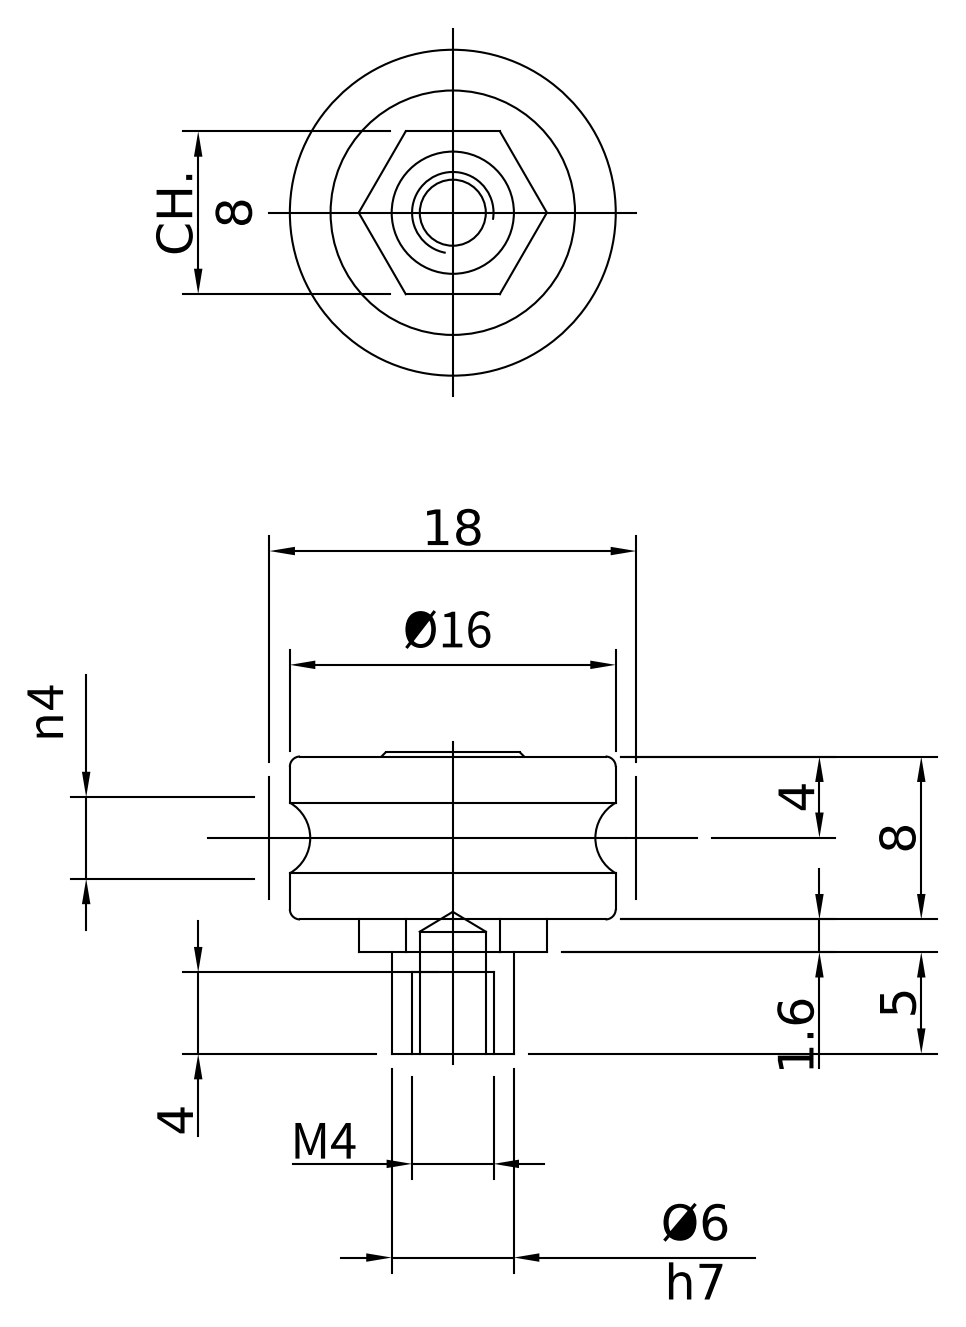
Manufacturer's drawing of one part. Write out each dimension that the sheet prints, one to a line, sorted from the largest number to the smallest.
18
Ø16
CH. 8
8
Ø6 h7
5
4
4
n4
M4
1.6
